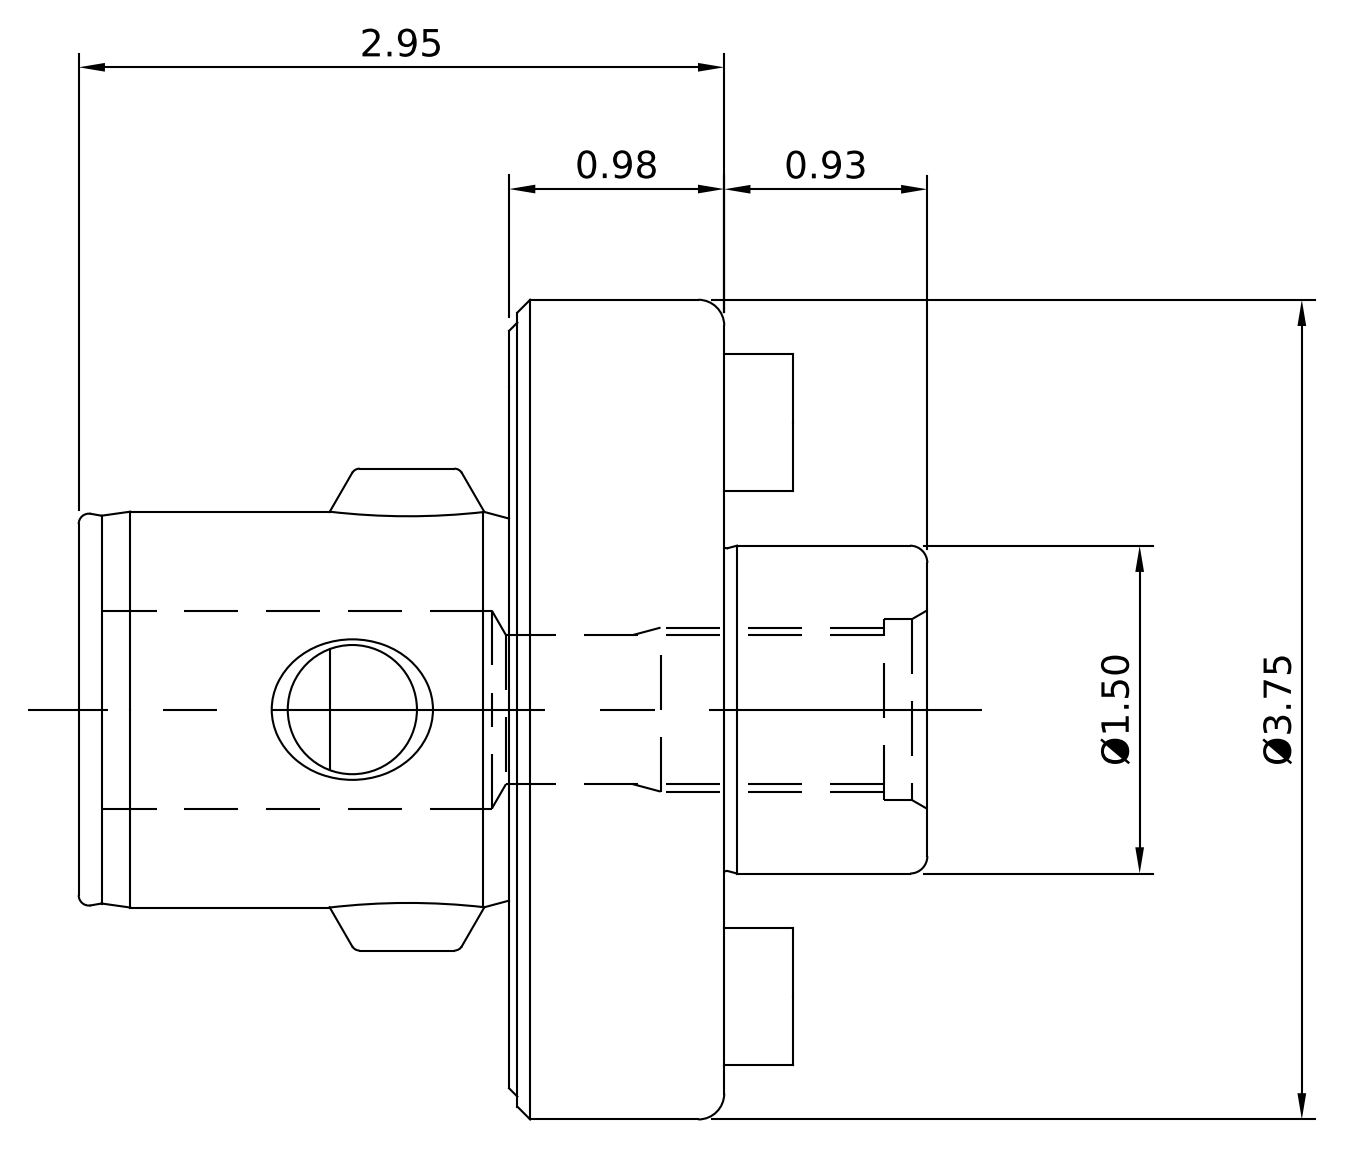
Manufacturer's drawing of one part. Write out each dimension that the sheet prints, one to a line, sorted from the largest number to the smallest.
Ø3.75
2.95
Ø1.50
0.98
0.93
